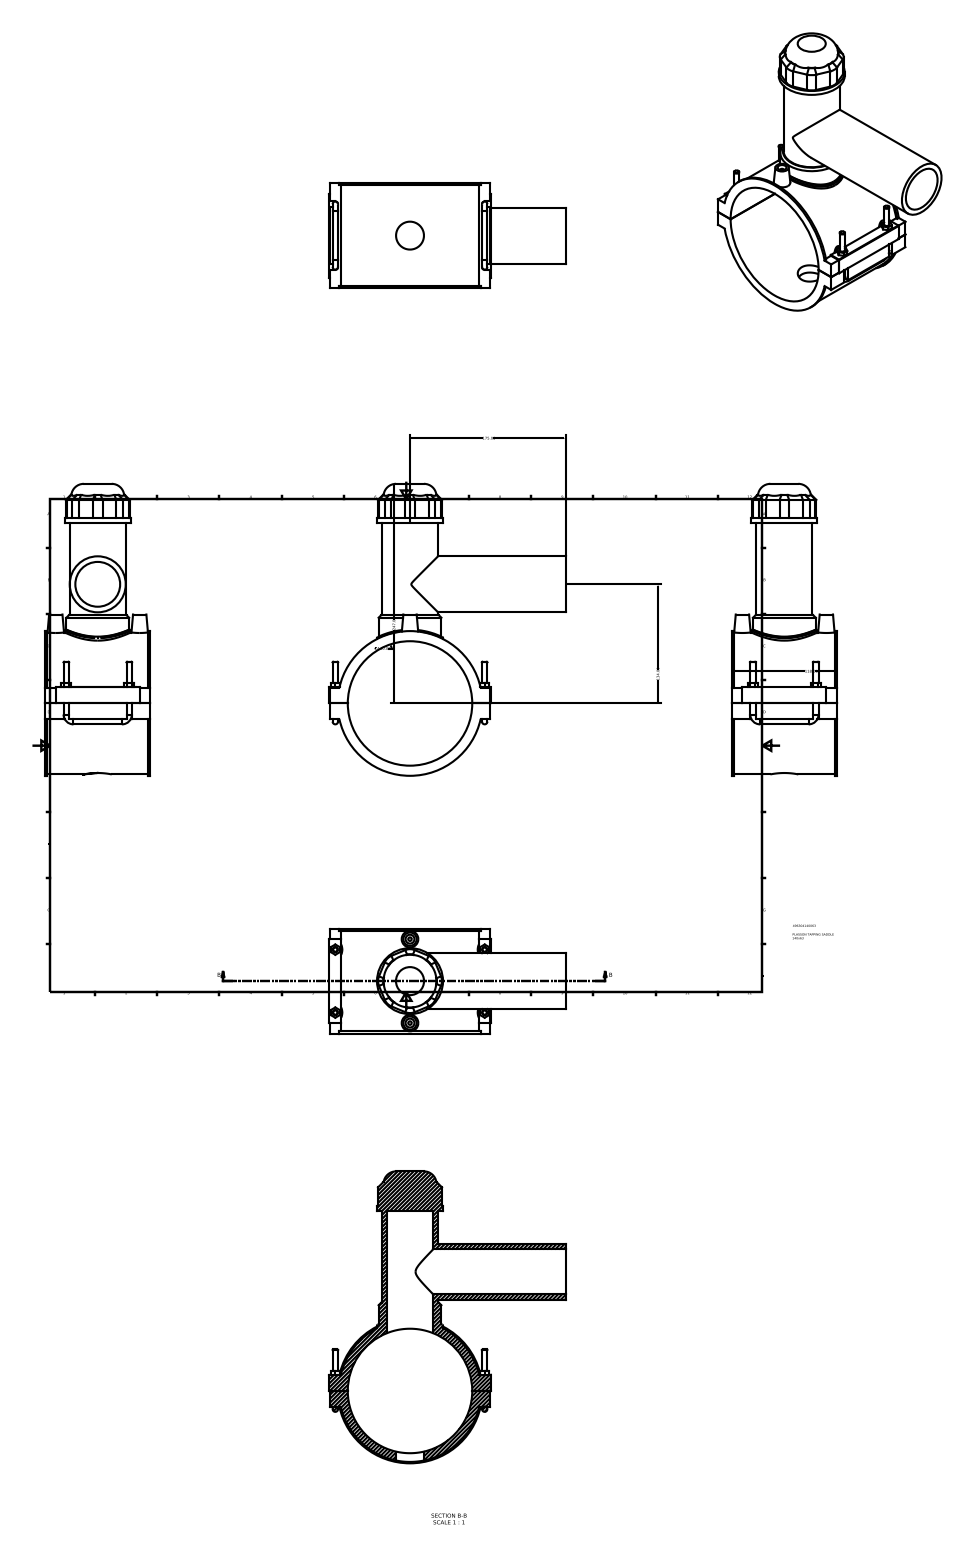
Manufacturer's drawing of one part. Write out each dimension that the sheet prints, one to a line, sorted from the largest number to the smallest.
247.00
175.00
∅140.00
134.00
118.00
